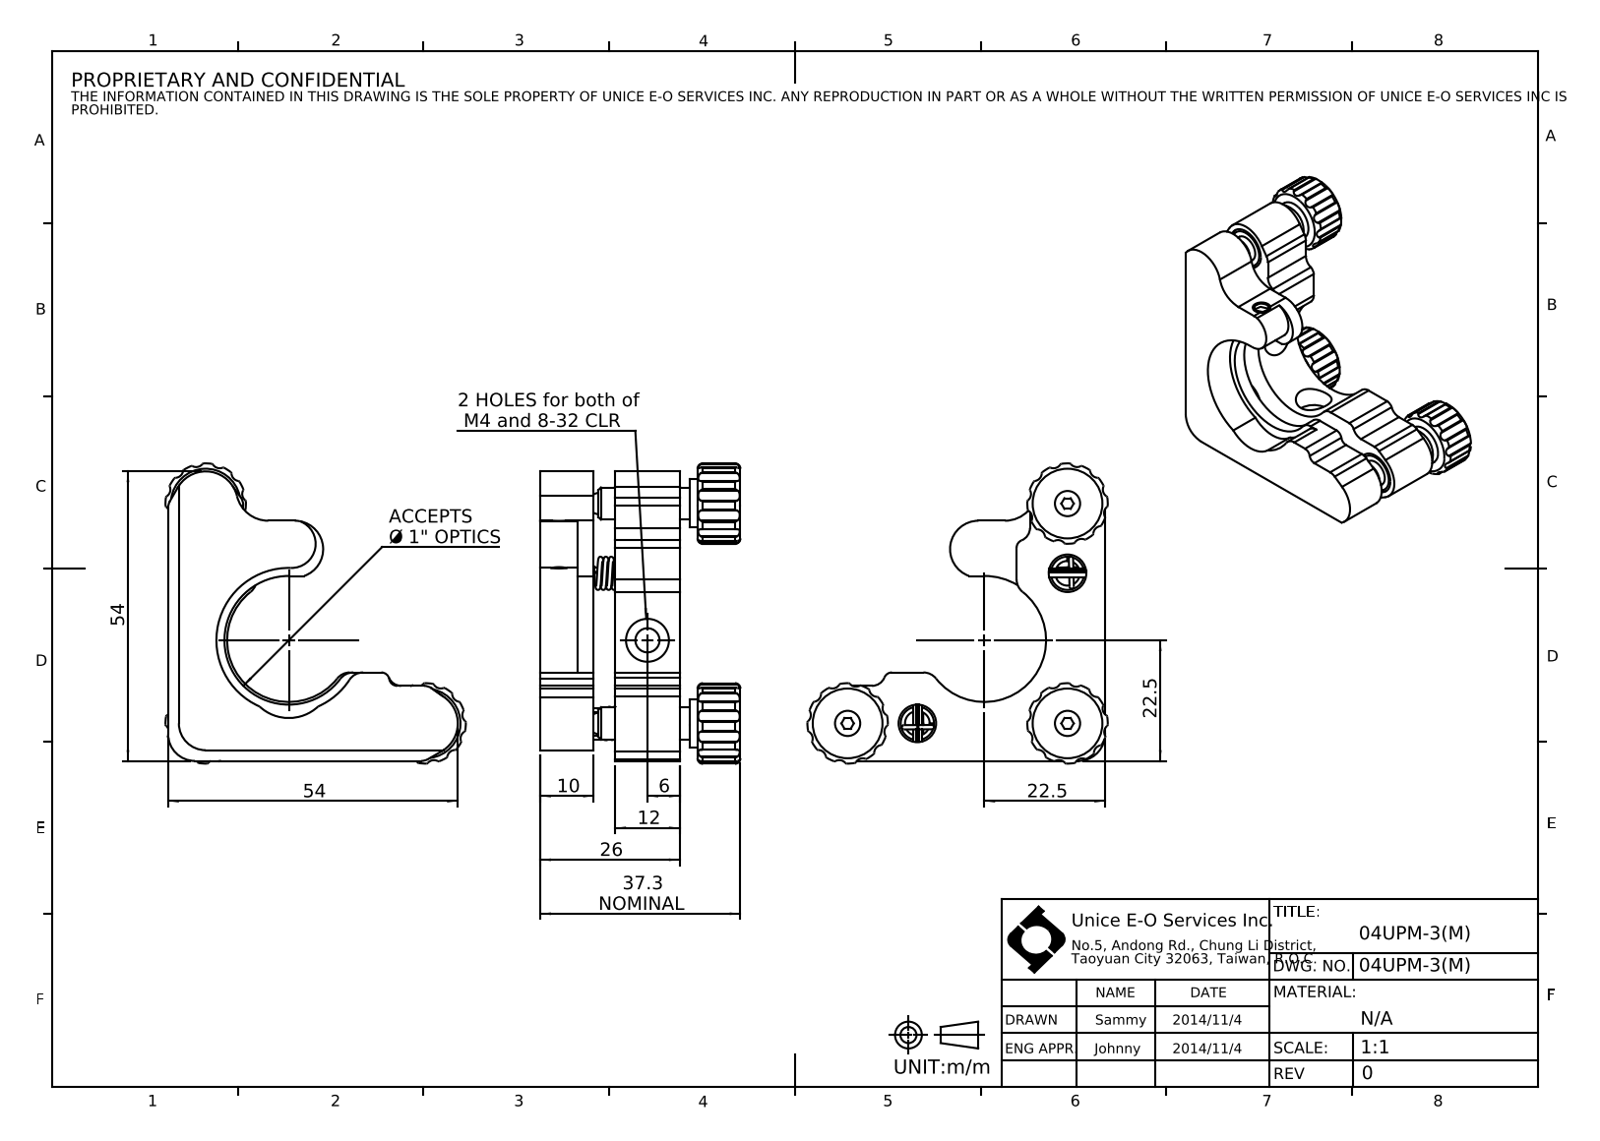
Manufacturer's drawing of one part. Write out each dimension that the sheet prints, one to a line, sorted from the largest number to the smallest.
54
54
37.3 NOMINAL
26
22.5
22.5
12
10
6
2 HOLES for both of M4 and 8-32 CLR
ACCEPTS Ø 1" OPTICS
